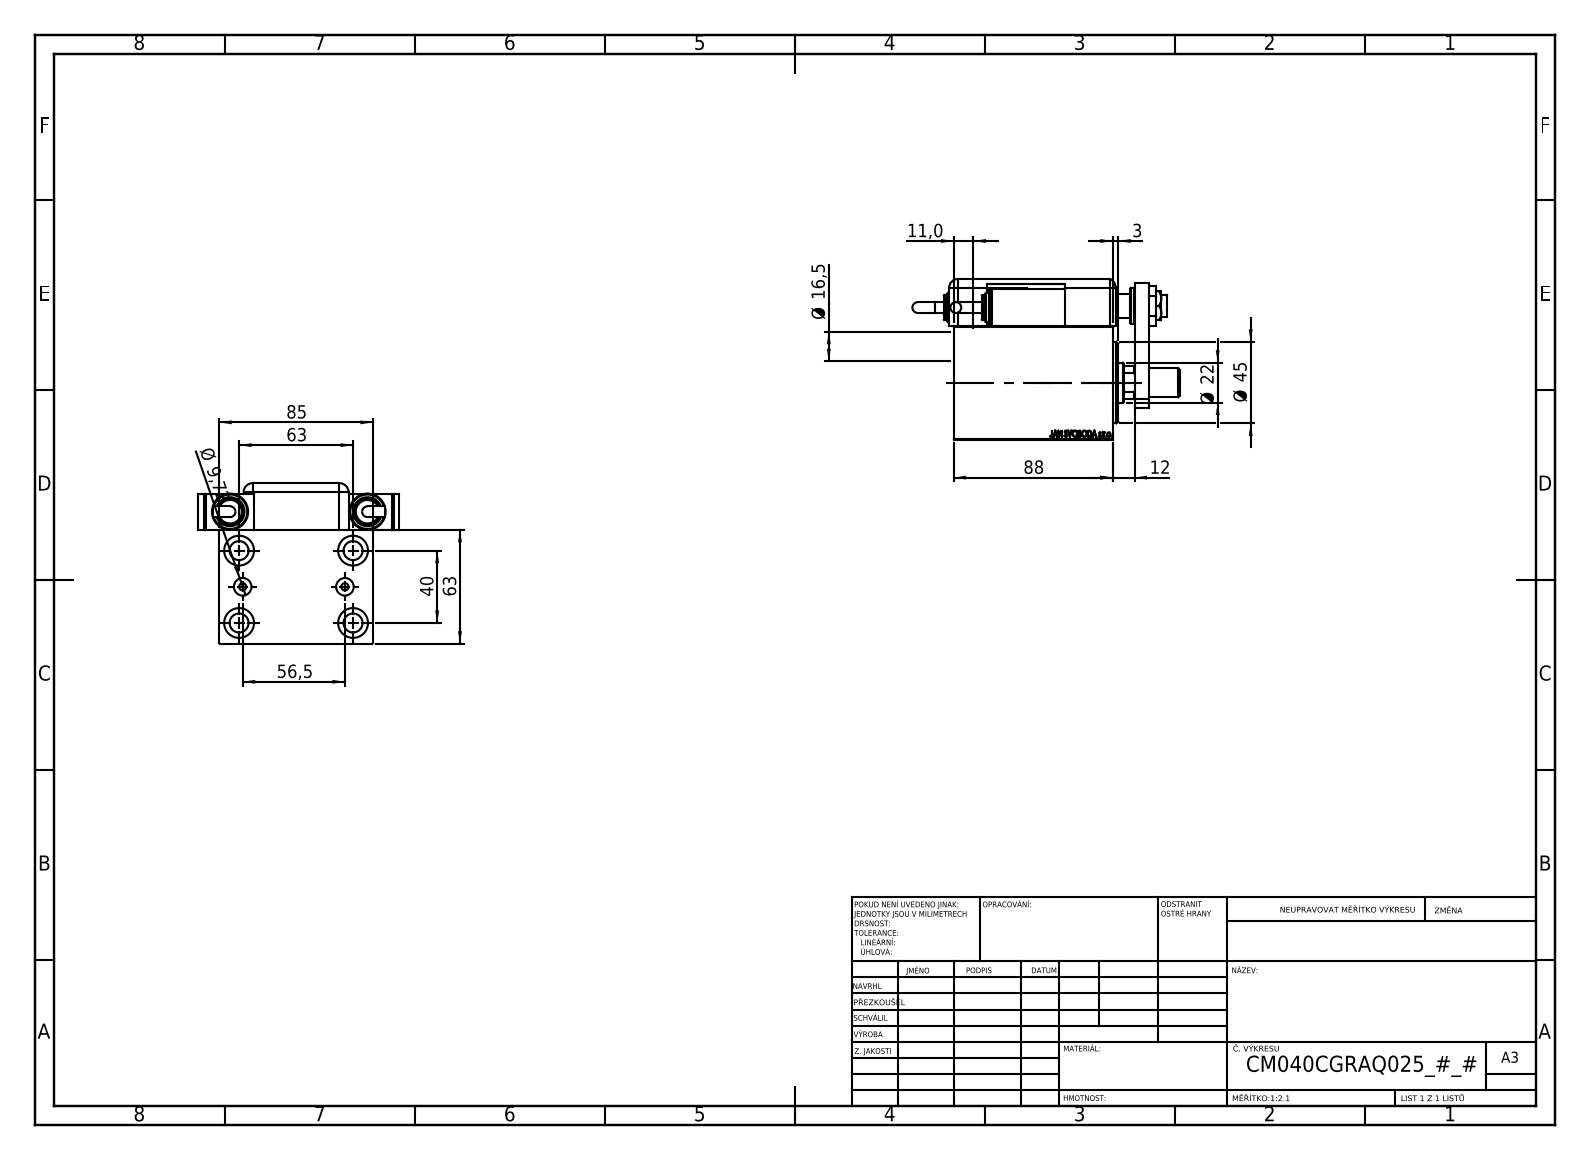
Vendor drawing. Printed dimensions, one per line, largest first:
88
85
63
63
56,5
Ø 45
40
Ø 22
Ø 16,5
12
11,0
Ø 9,72
3
